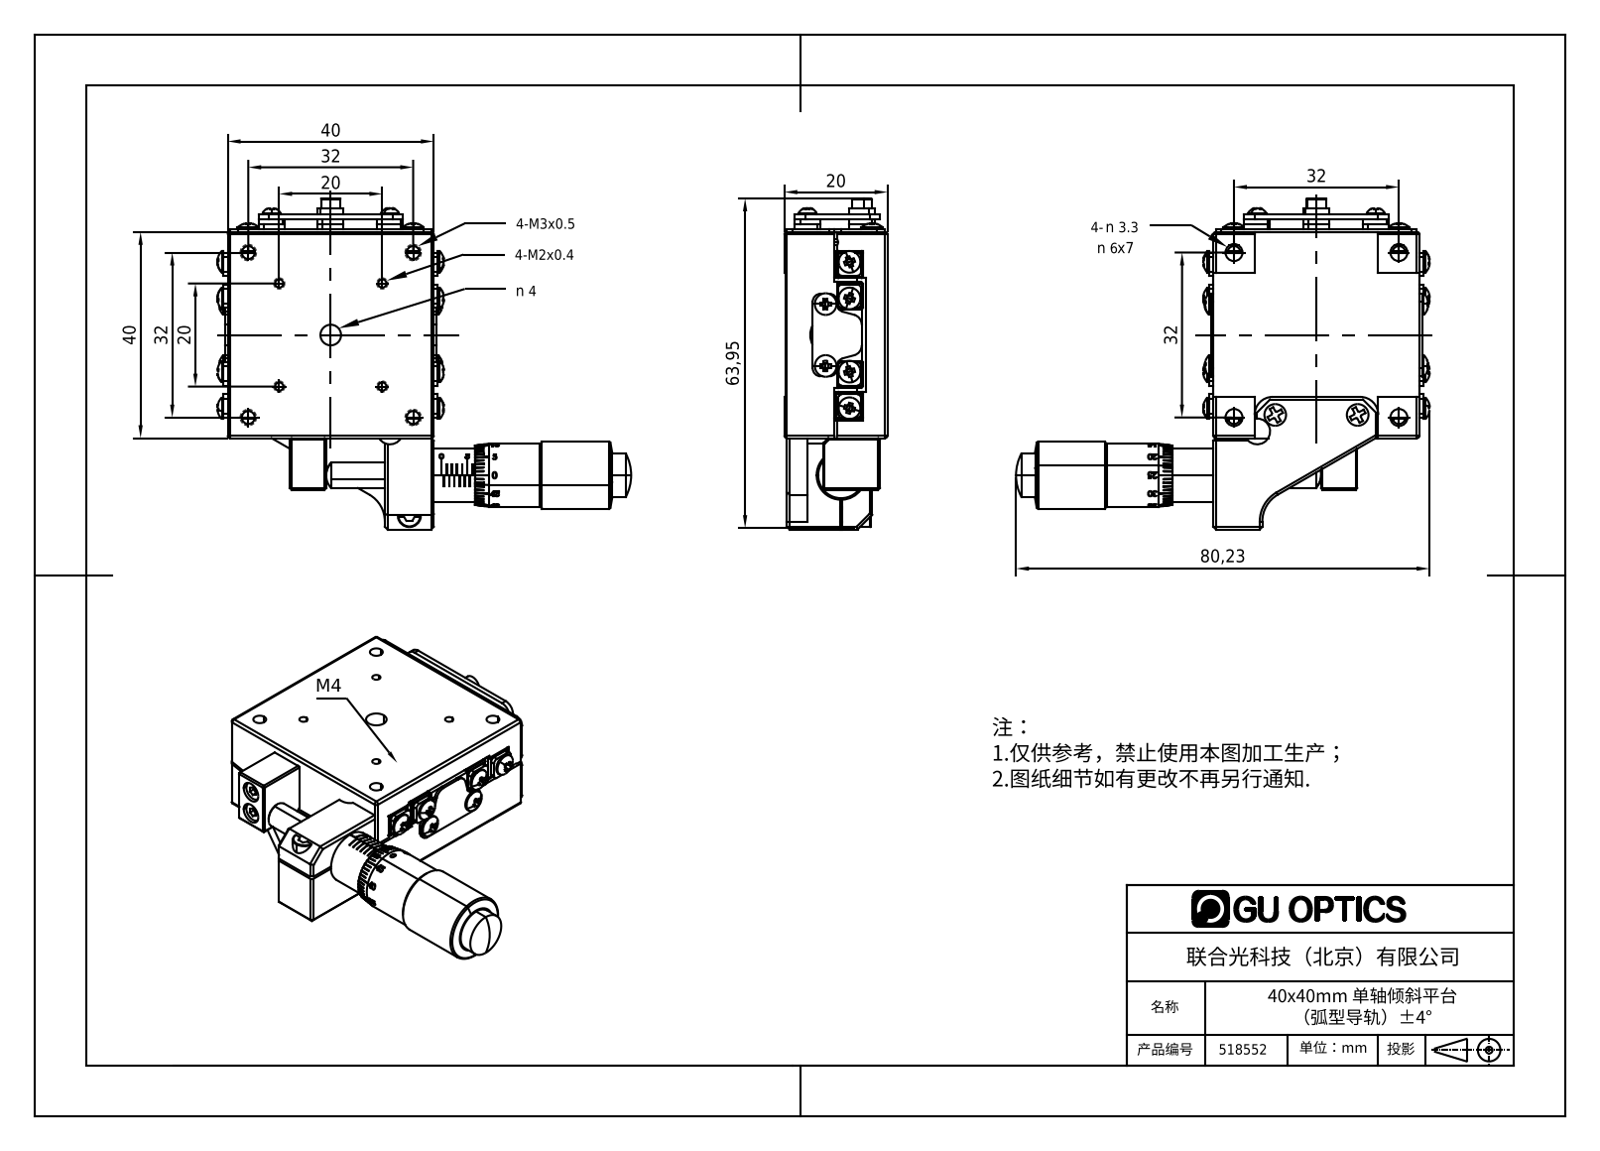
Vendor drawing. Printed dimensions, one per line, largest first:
80,23
63,95
40
40
32
32
32
32
20
20
20
